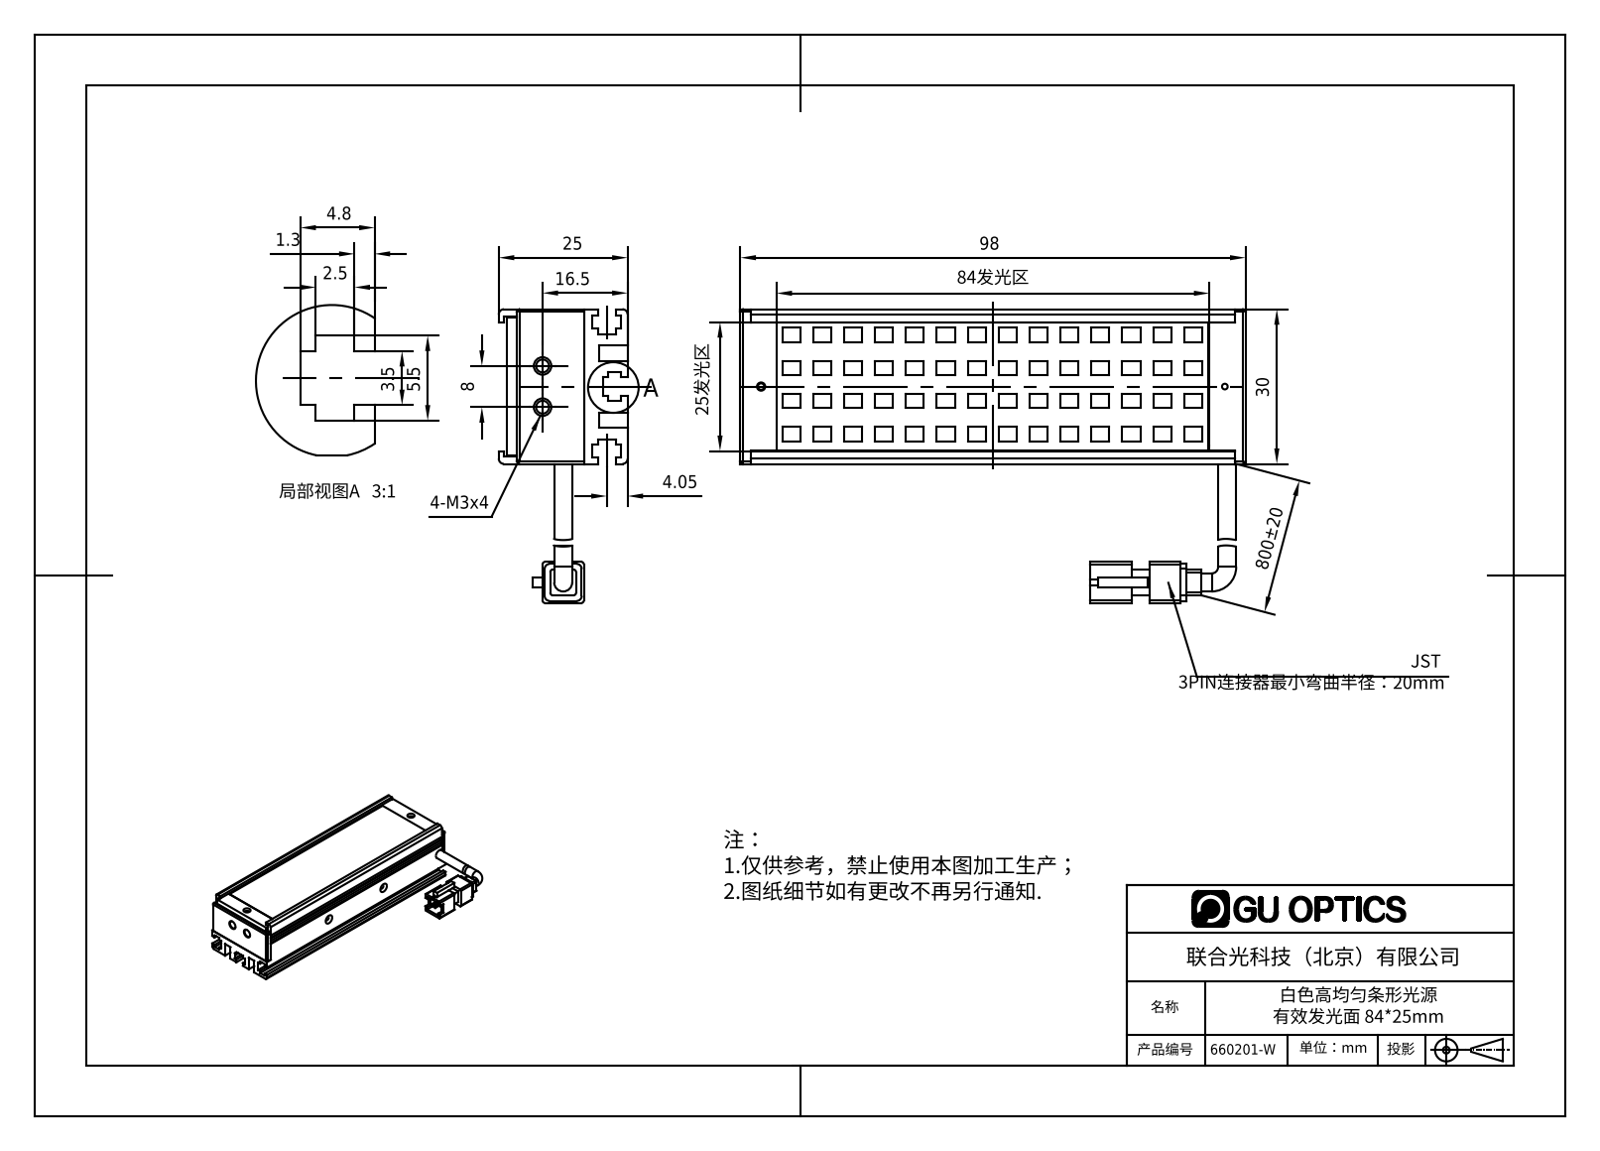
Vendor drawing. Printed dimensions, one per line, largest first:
800±20
98
84发光区
30
25发光区
25
16.5
8
5.5
4.8
4.05
3.5
2.5
1.3
